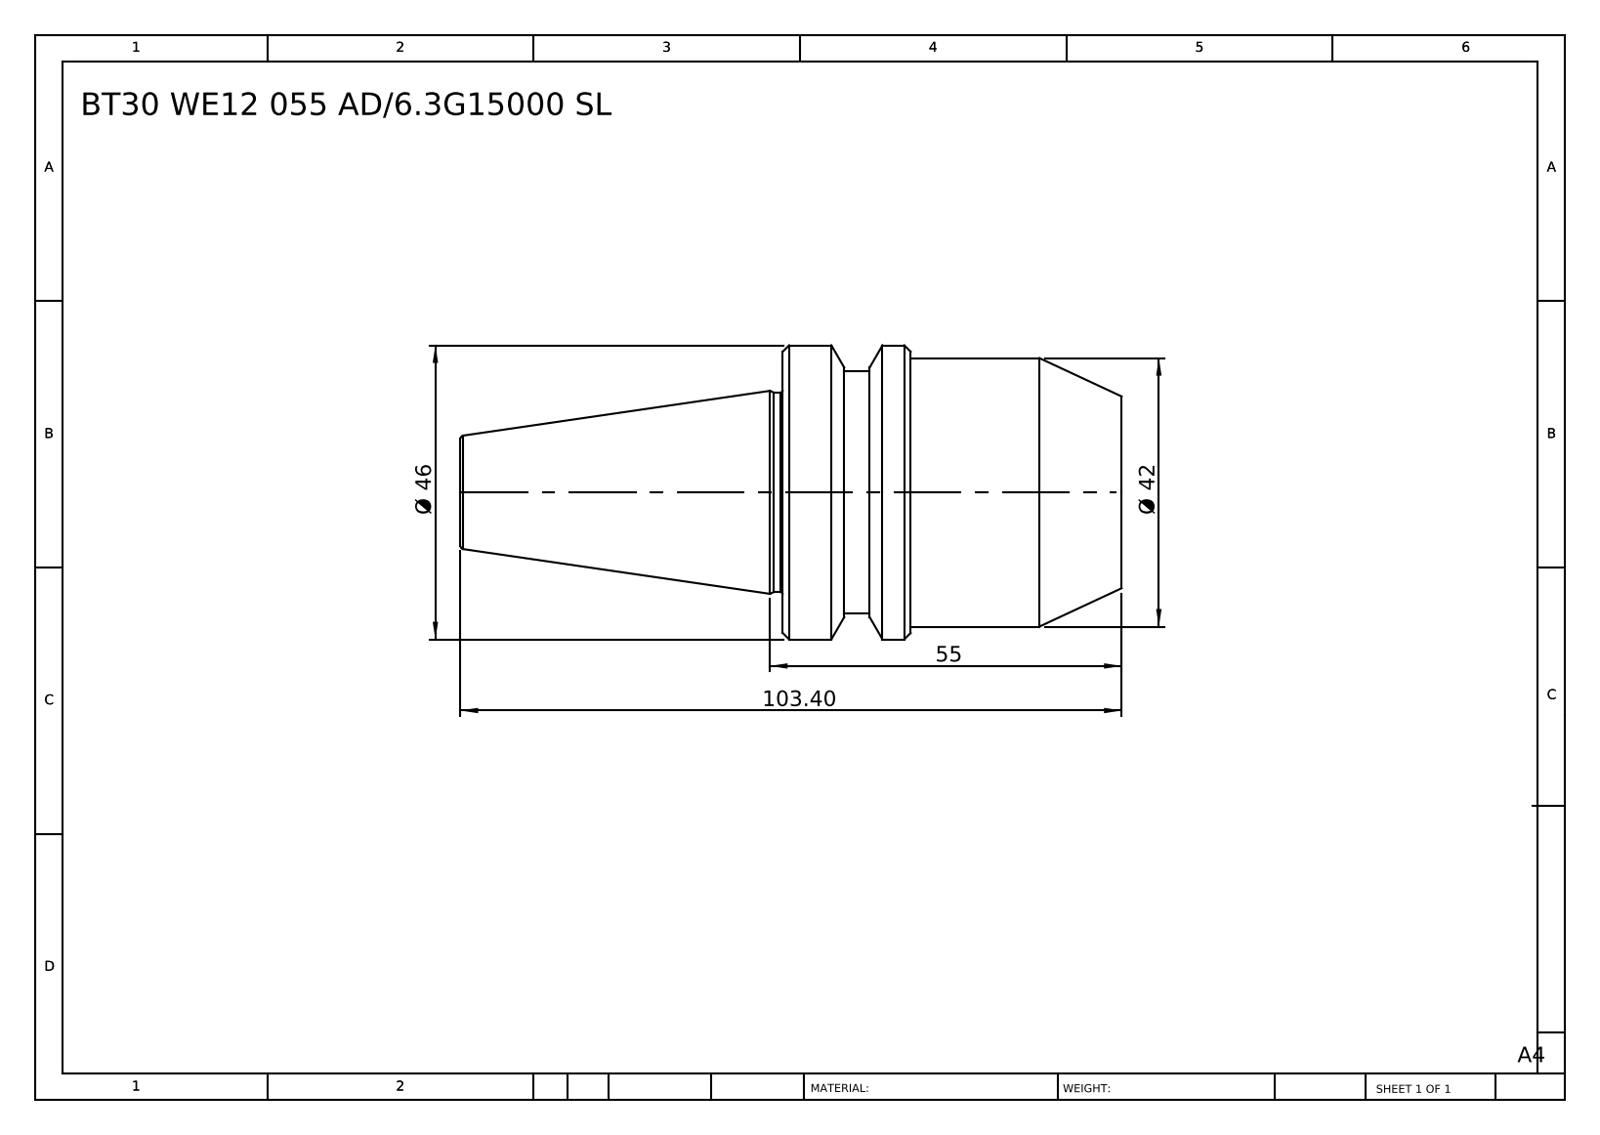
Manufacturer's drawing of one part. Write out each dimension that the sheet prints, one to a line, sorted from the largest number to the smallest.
103.40
55
Ø 46
Ø 42
